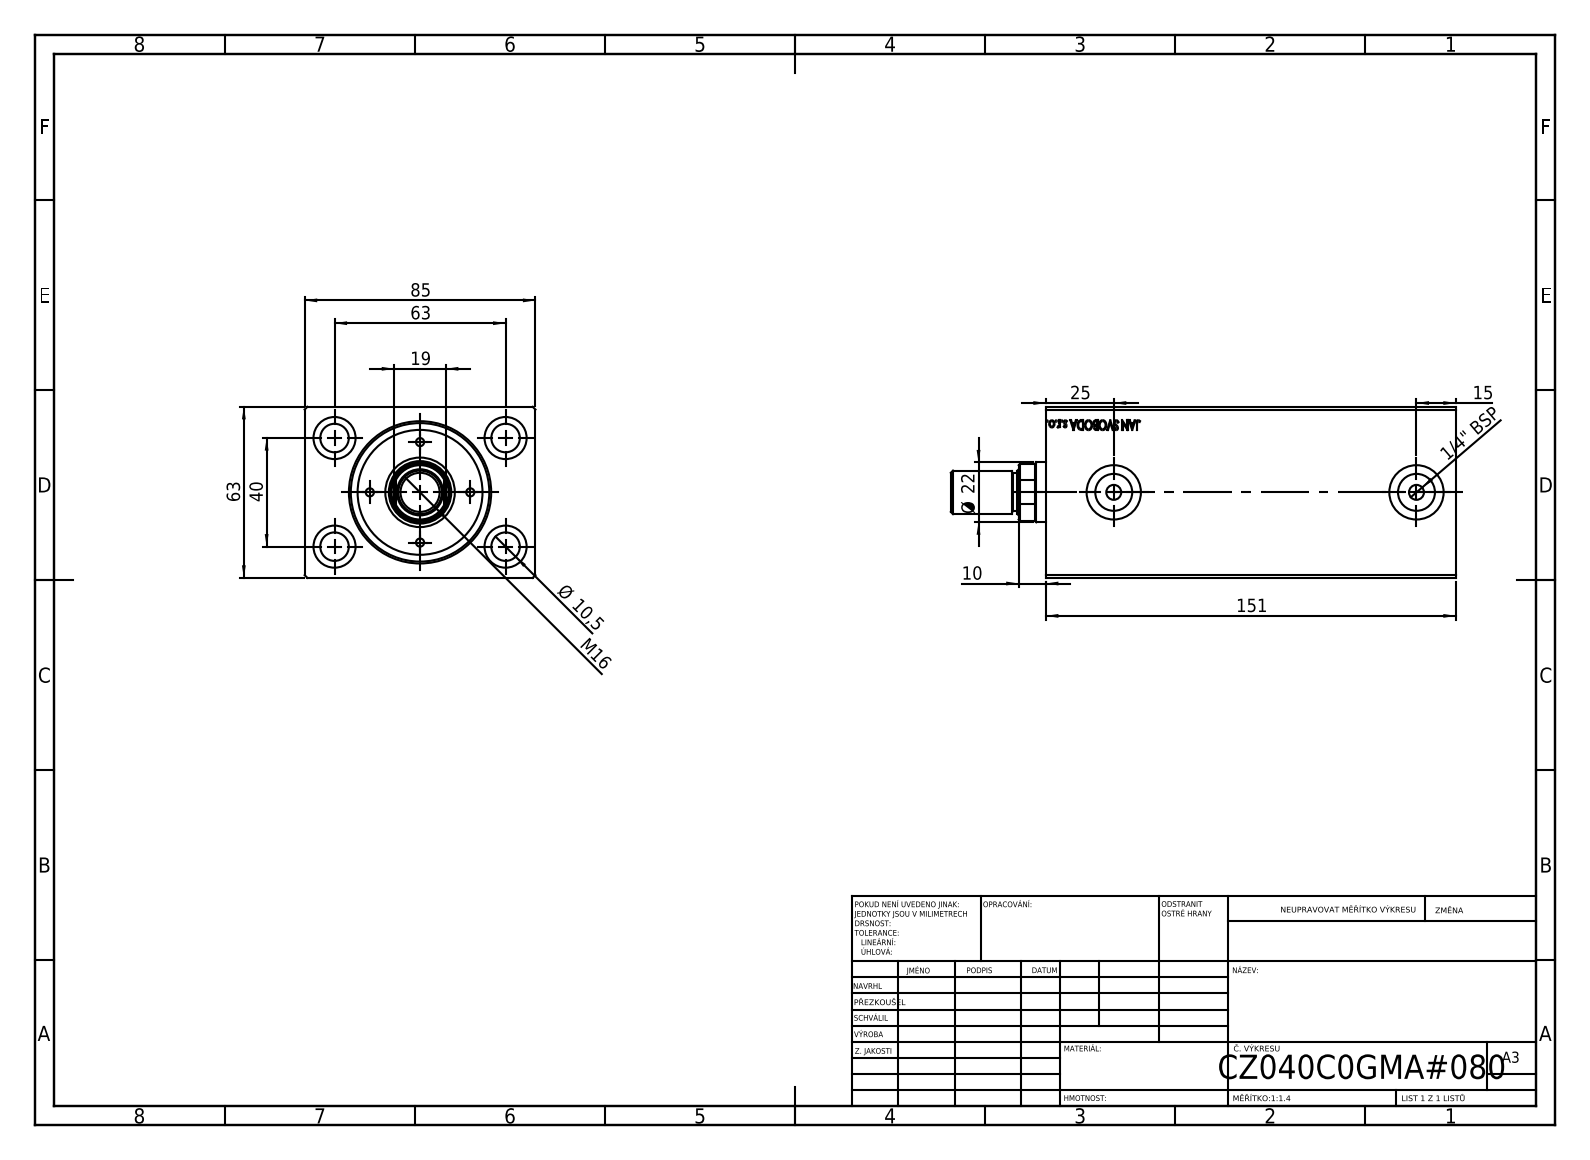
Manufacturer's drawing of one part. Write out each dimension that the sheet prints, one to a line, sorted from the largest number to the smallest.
151
85
63
63
40
25
Ø 22
19
M16
15
Ø 10,5
10
1/4" BSP
